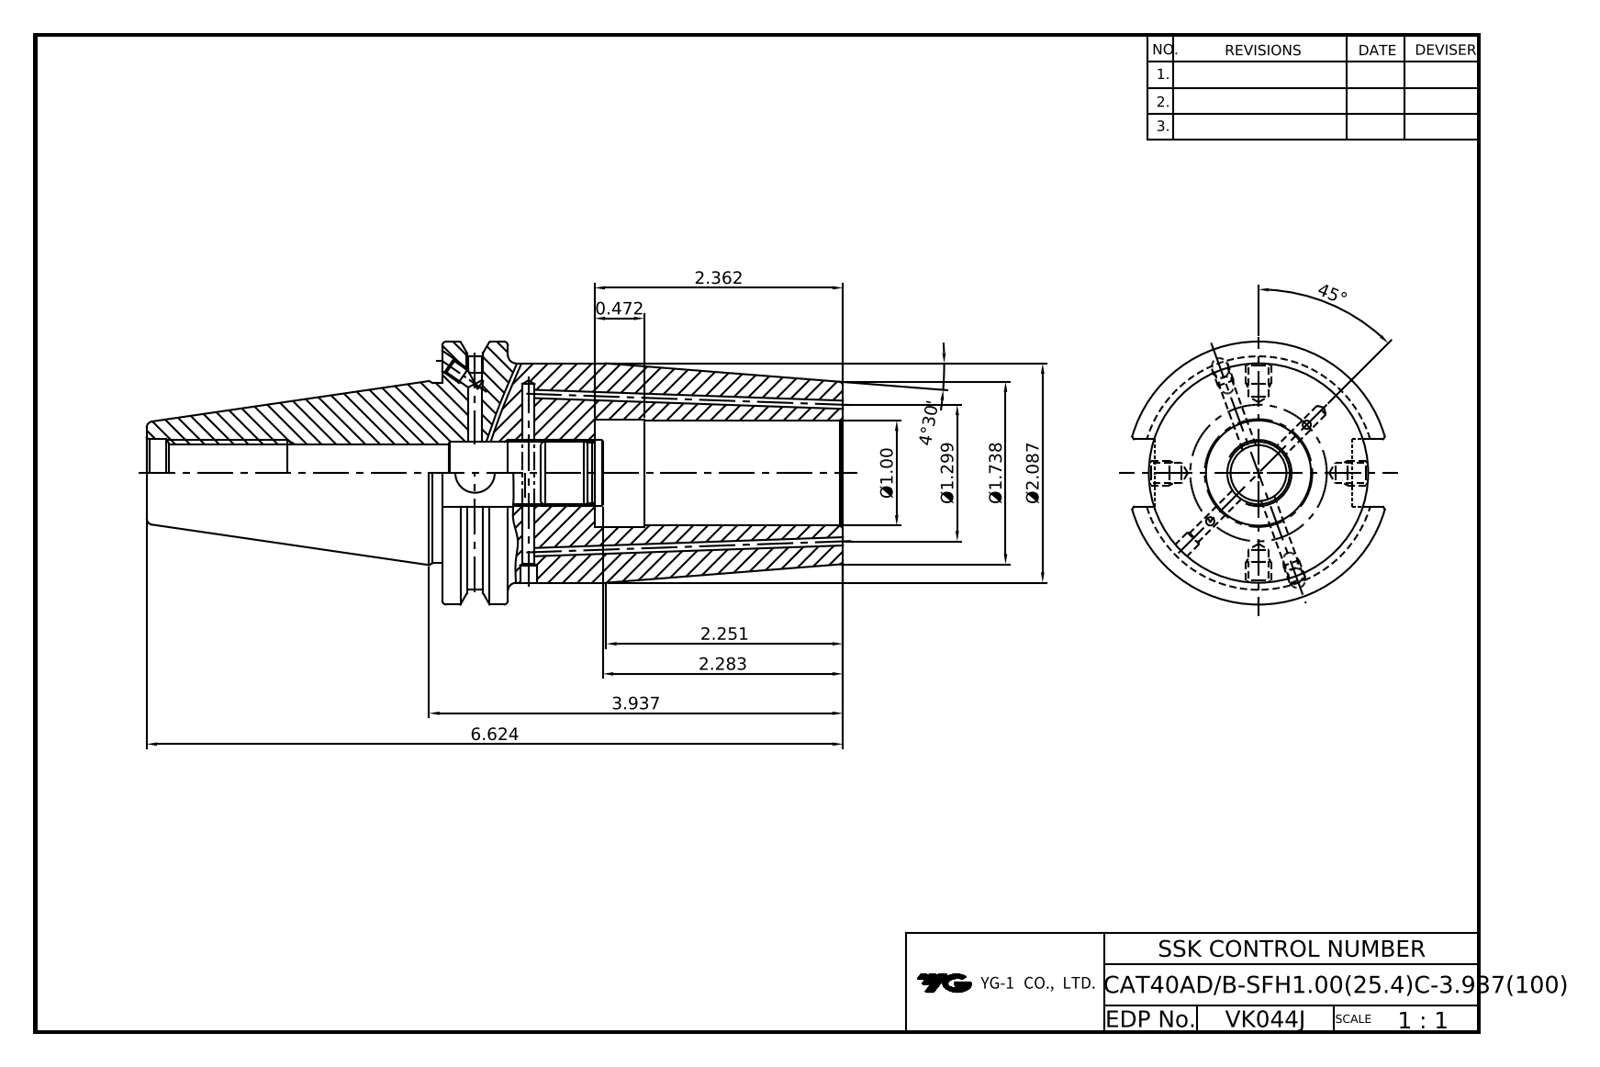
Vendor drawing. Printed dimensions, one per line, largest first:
45°
6.624
4°30'
3.937
2.362
2.283
2.251
Ø2.087
Ø1.738
Ø1.299
Ø1.00
0.472
